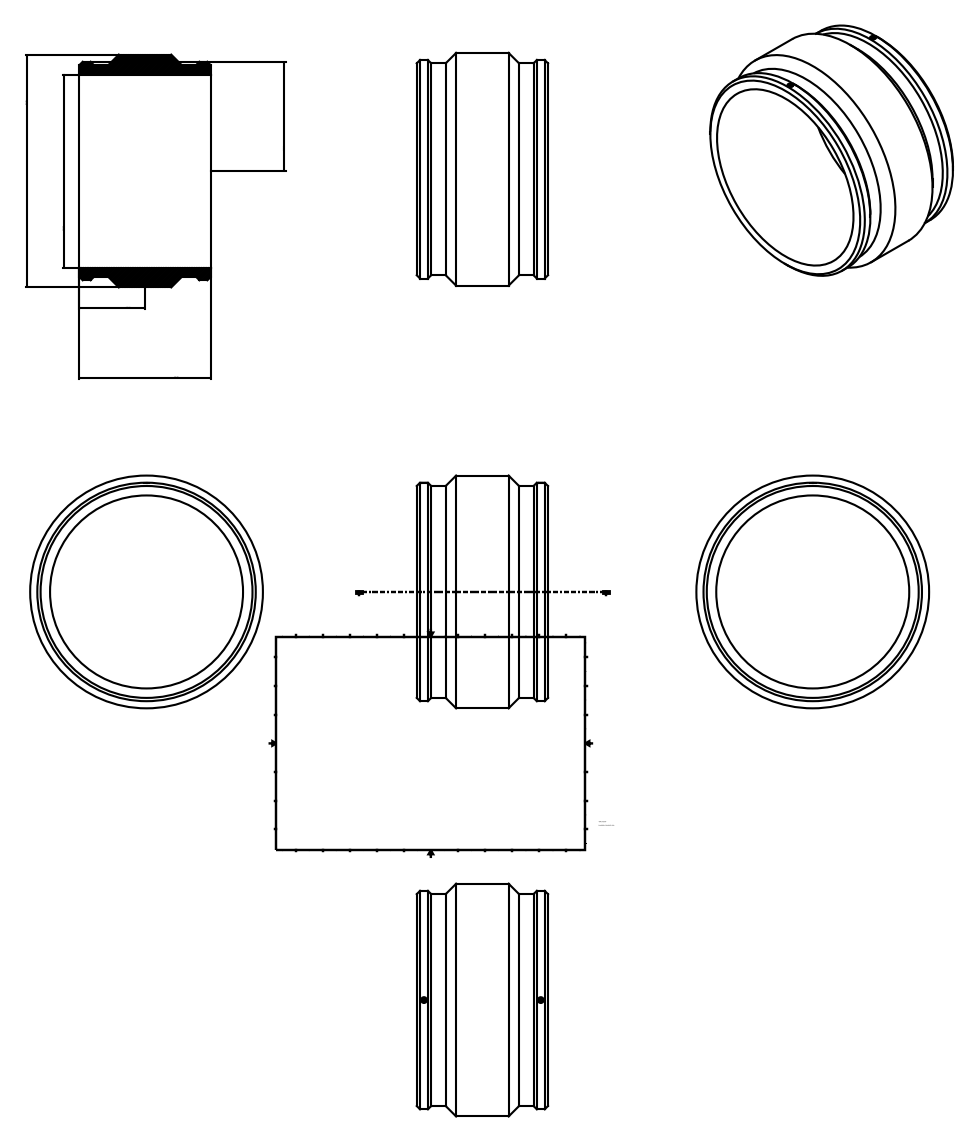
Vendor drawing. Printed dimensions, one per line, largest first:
603,00
500,00
340,00
283,00
170,00
